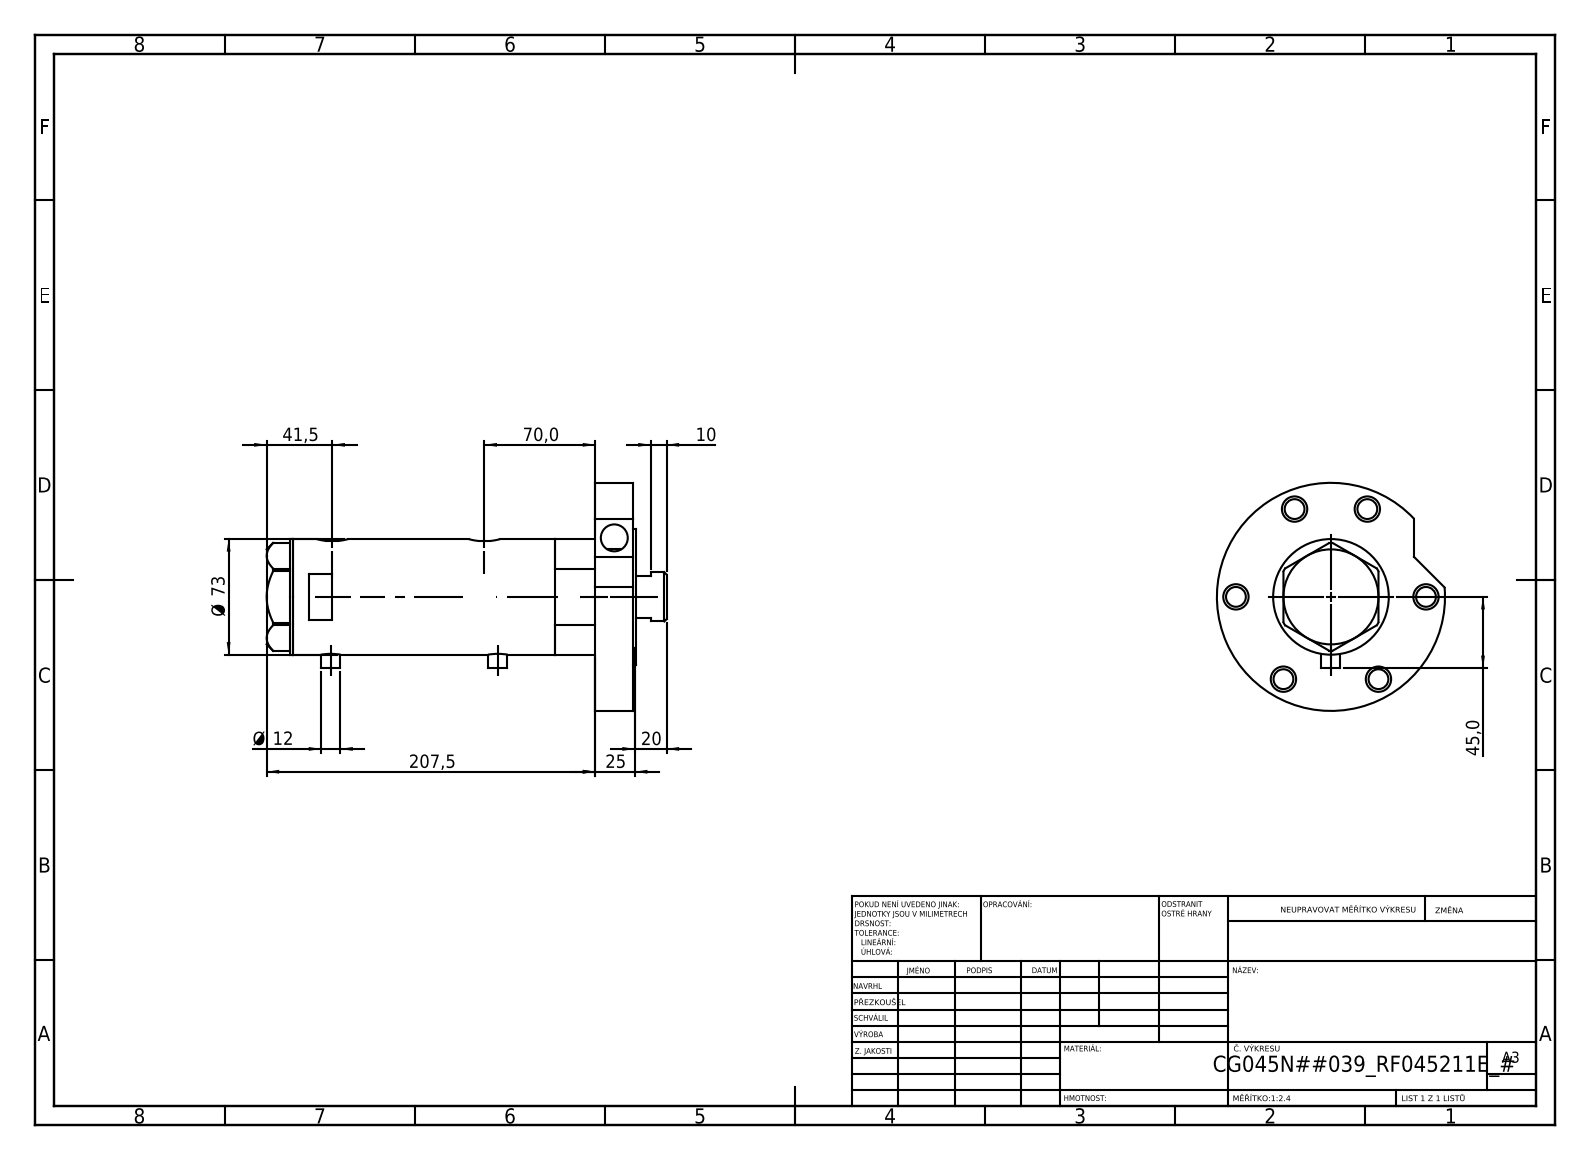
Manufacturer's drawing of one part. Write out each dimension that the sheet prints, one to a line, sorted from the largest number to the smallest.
207,5
Ø 73
70,0
45,0
41,5
25
20
Ø 12
10
